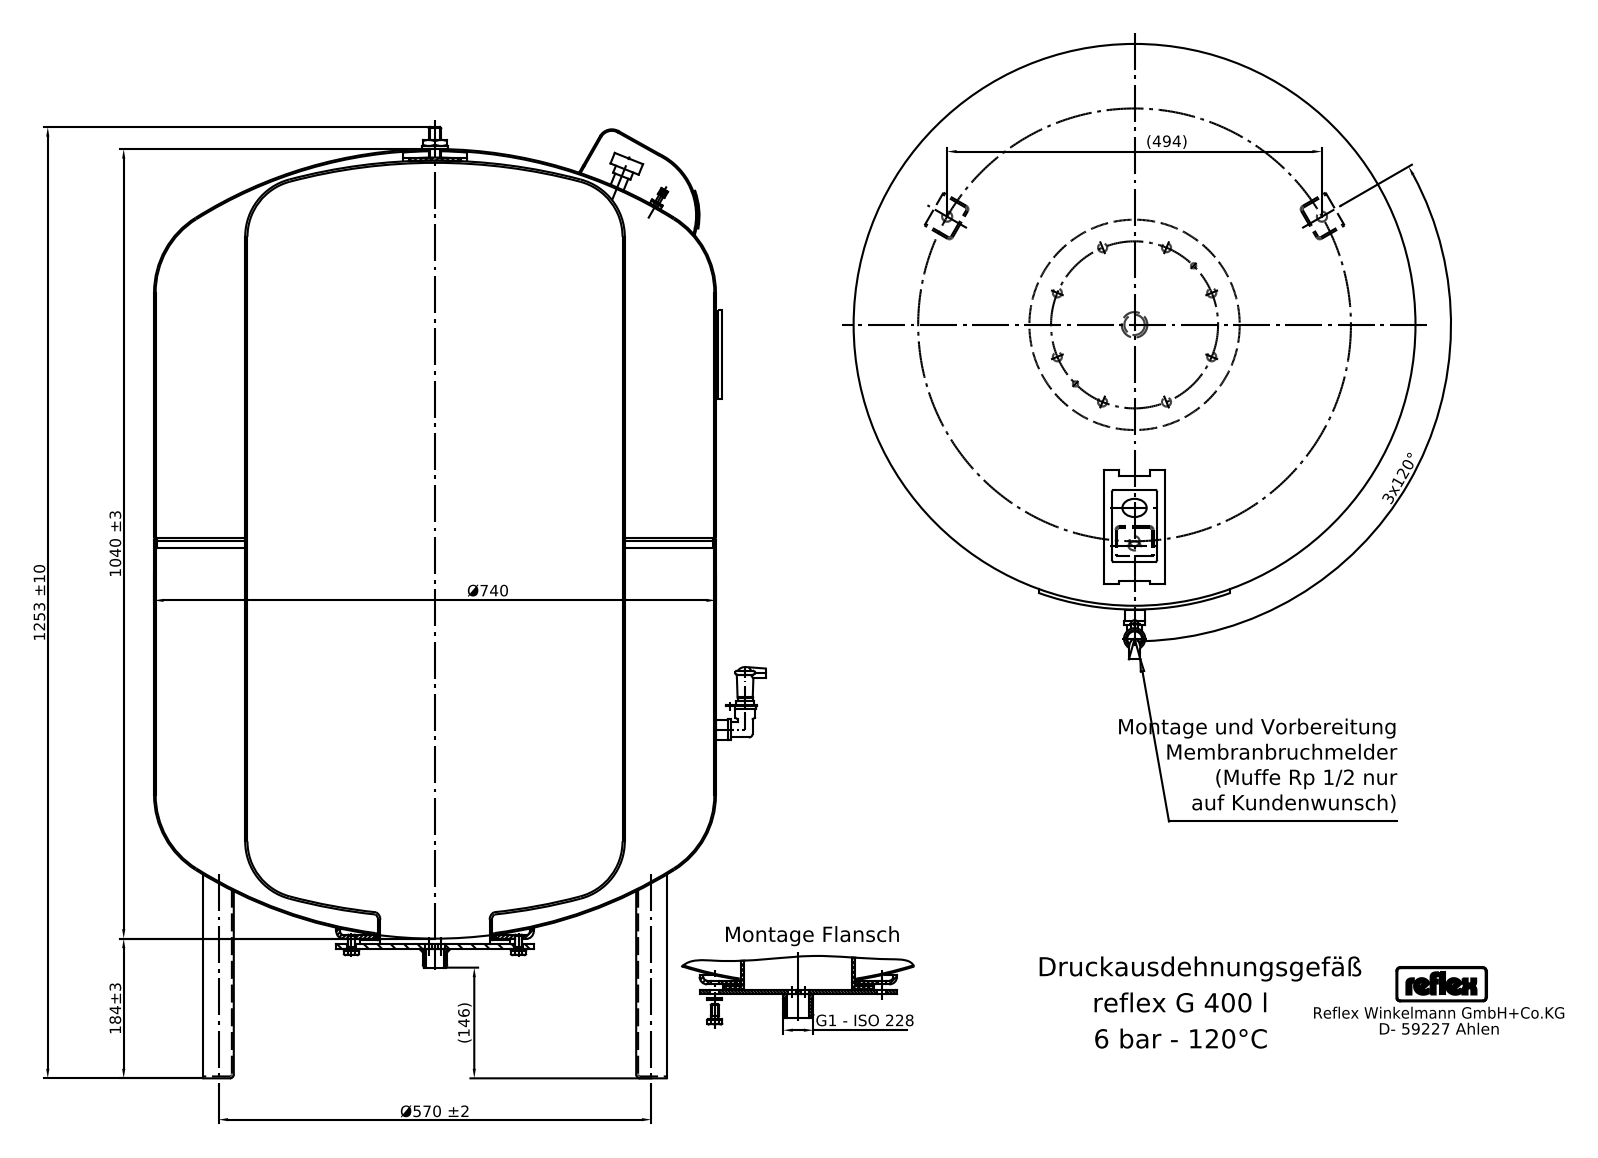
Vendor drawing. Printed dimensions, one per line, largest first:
1253 ±10
1040 ±3
Ø740
Ø570 ±2
(494)
184±3
(146)
3x120°
G1 - ISO 228
